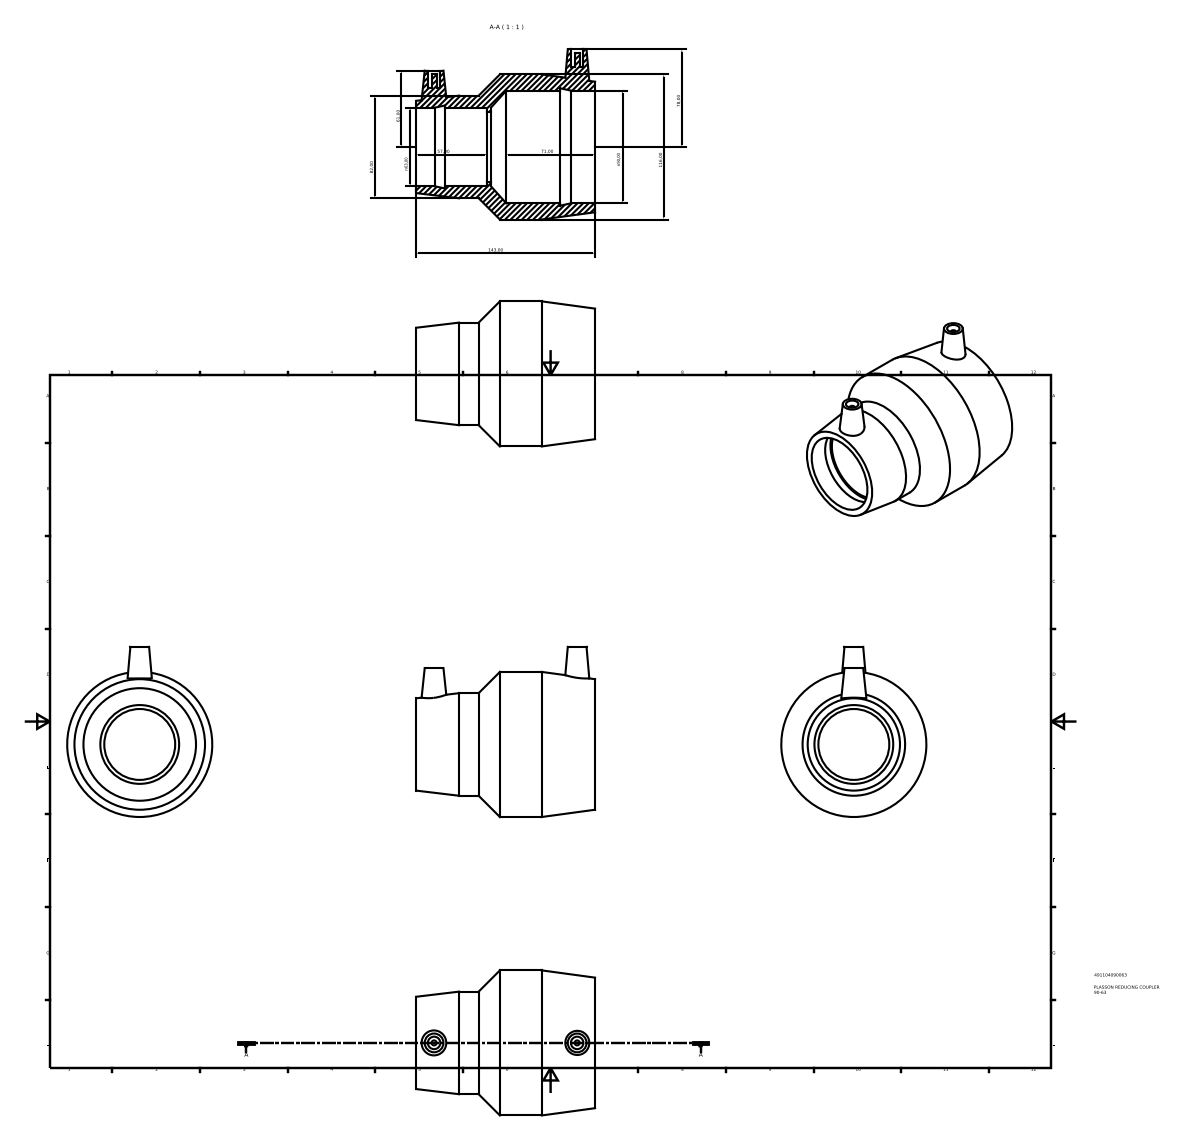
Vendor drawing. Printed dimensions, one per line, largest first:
143,00
116,00
n90,00
82,00
78,00
71,00
n63,00
61,00
57,00
